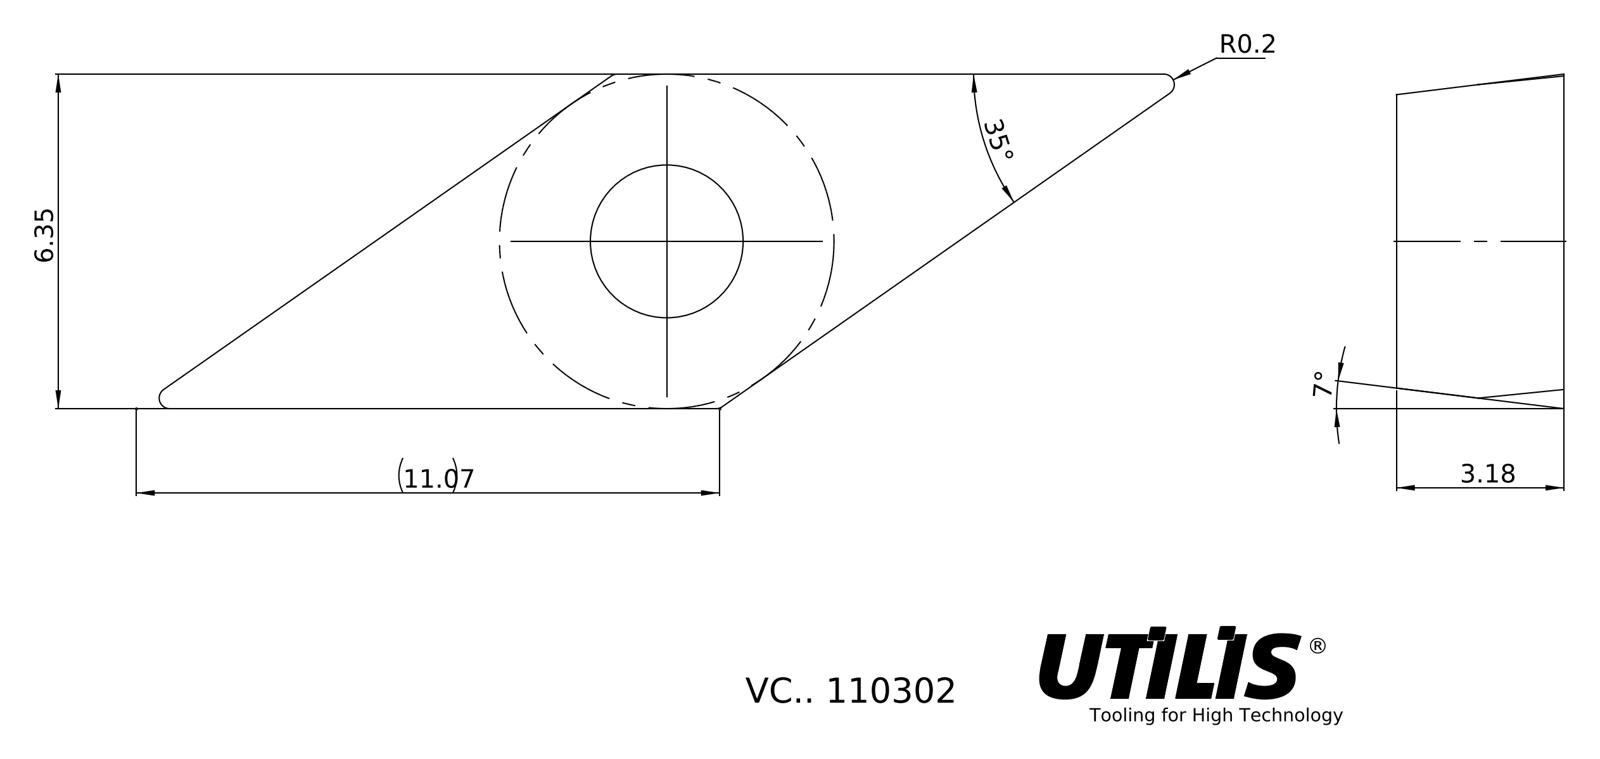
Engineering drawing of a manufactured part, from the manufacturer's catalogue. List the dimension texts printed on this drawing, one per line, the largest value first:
35°
11.07
6.35
3.18
R0.2
